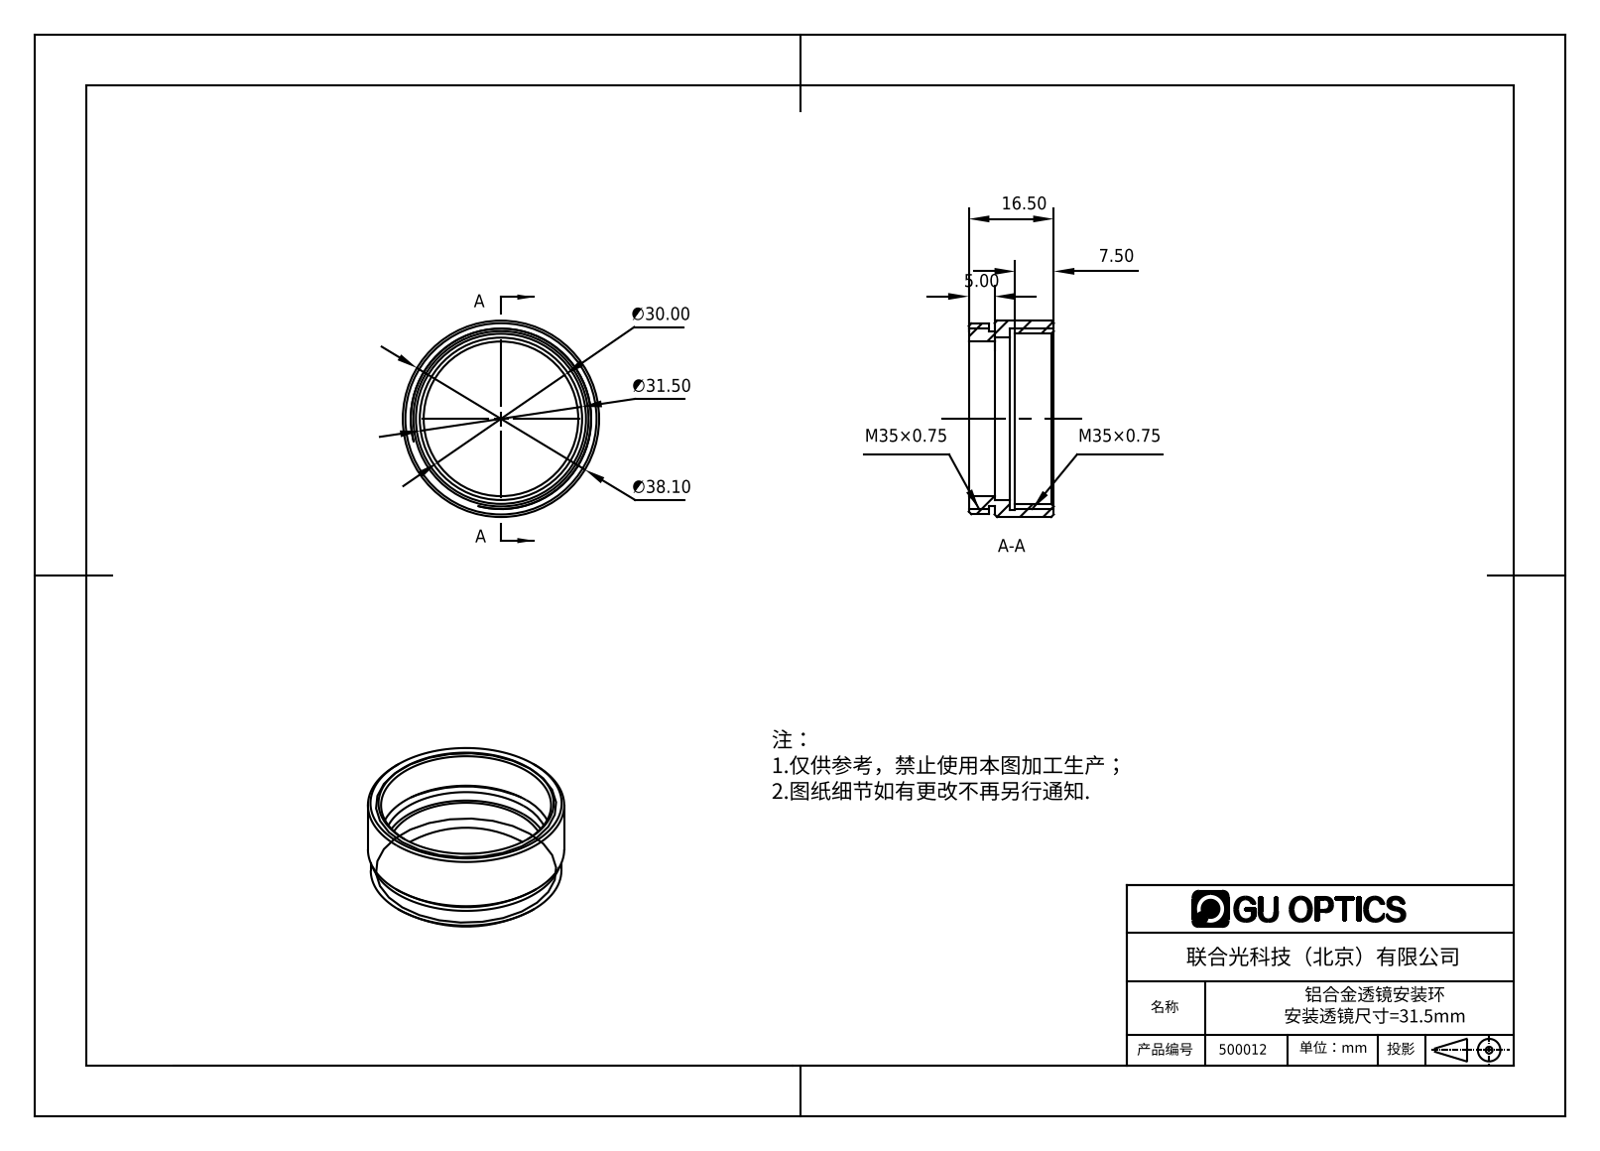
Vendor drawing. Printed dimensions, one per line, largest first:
∅38.10
∅31.50
∅30.00
16.50
7.50
5.00
